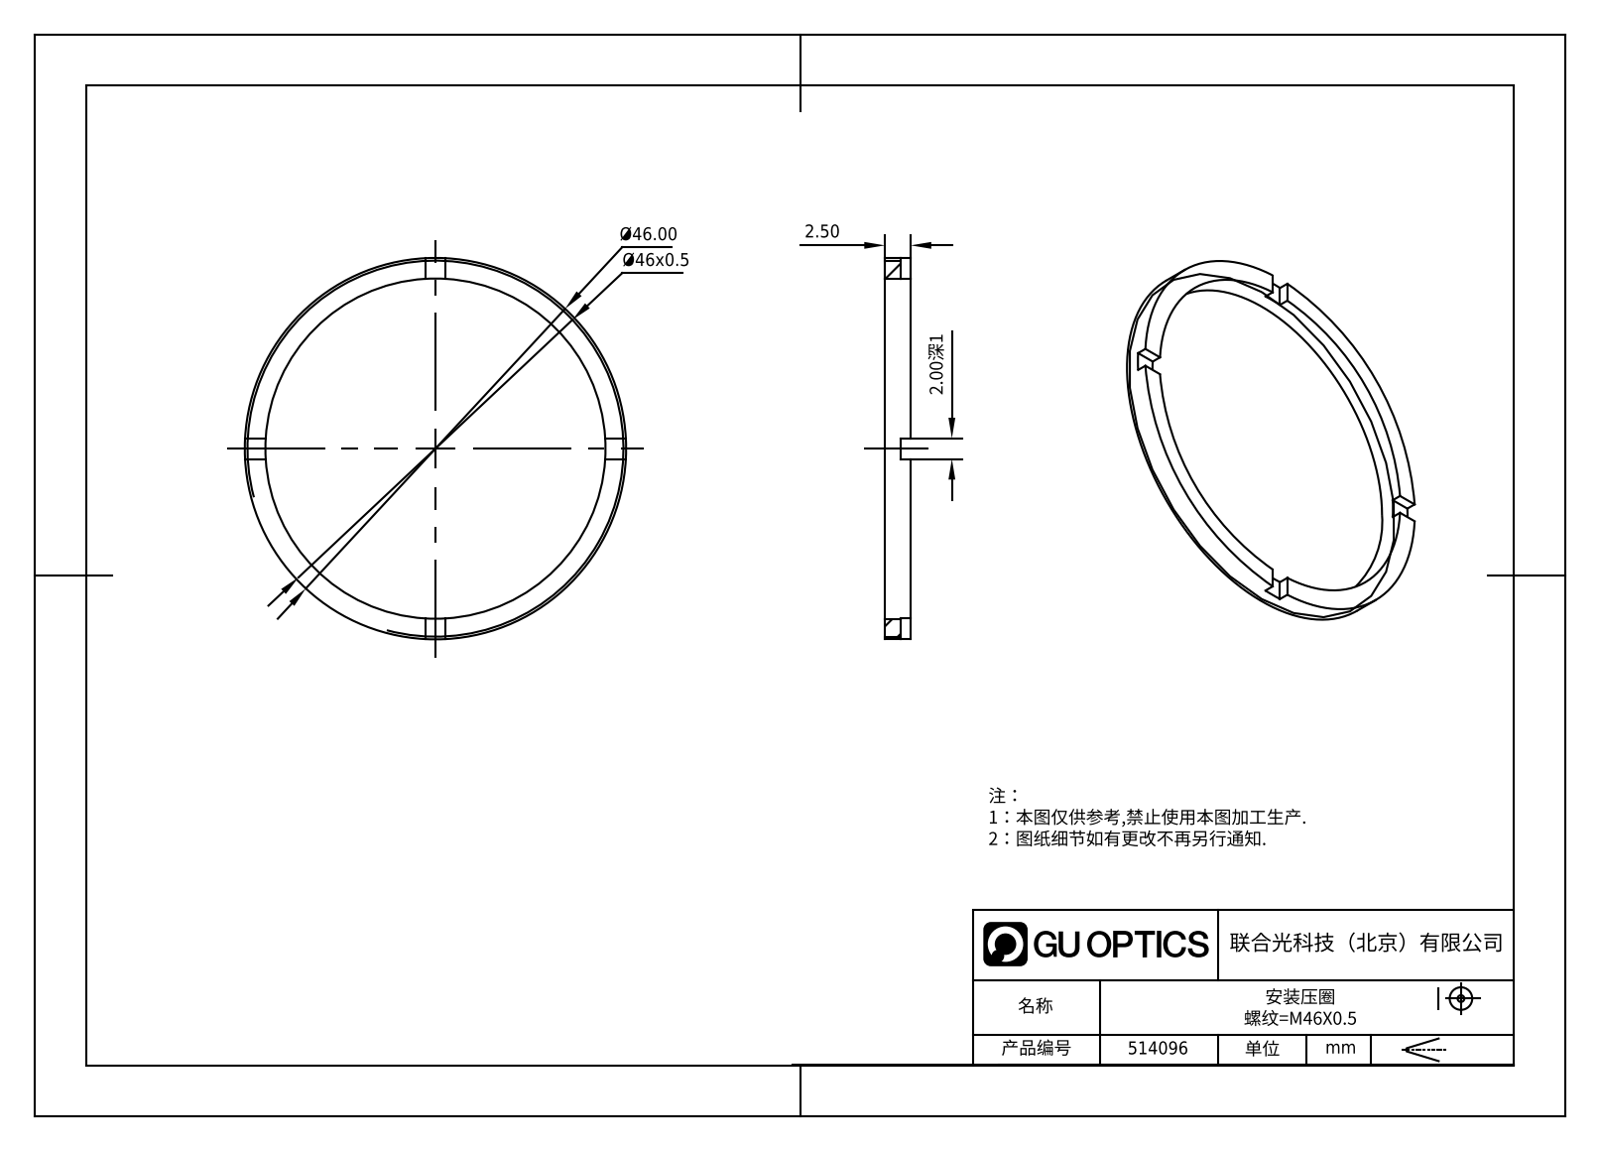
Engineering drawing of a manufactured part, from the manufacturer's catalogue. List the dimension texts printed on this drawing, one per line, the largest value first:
Ø46.00
Ø46x0.5
2.50
2.00深1
